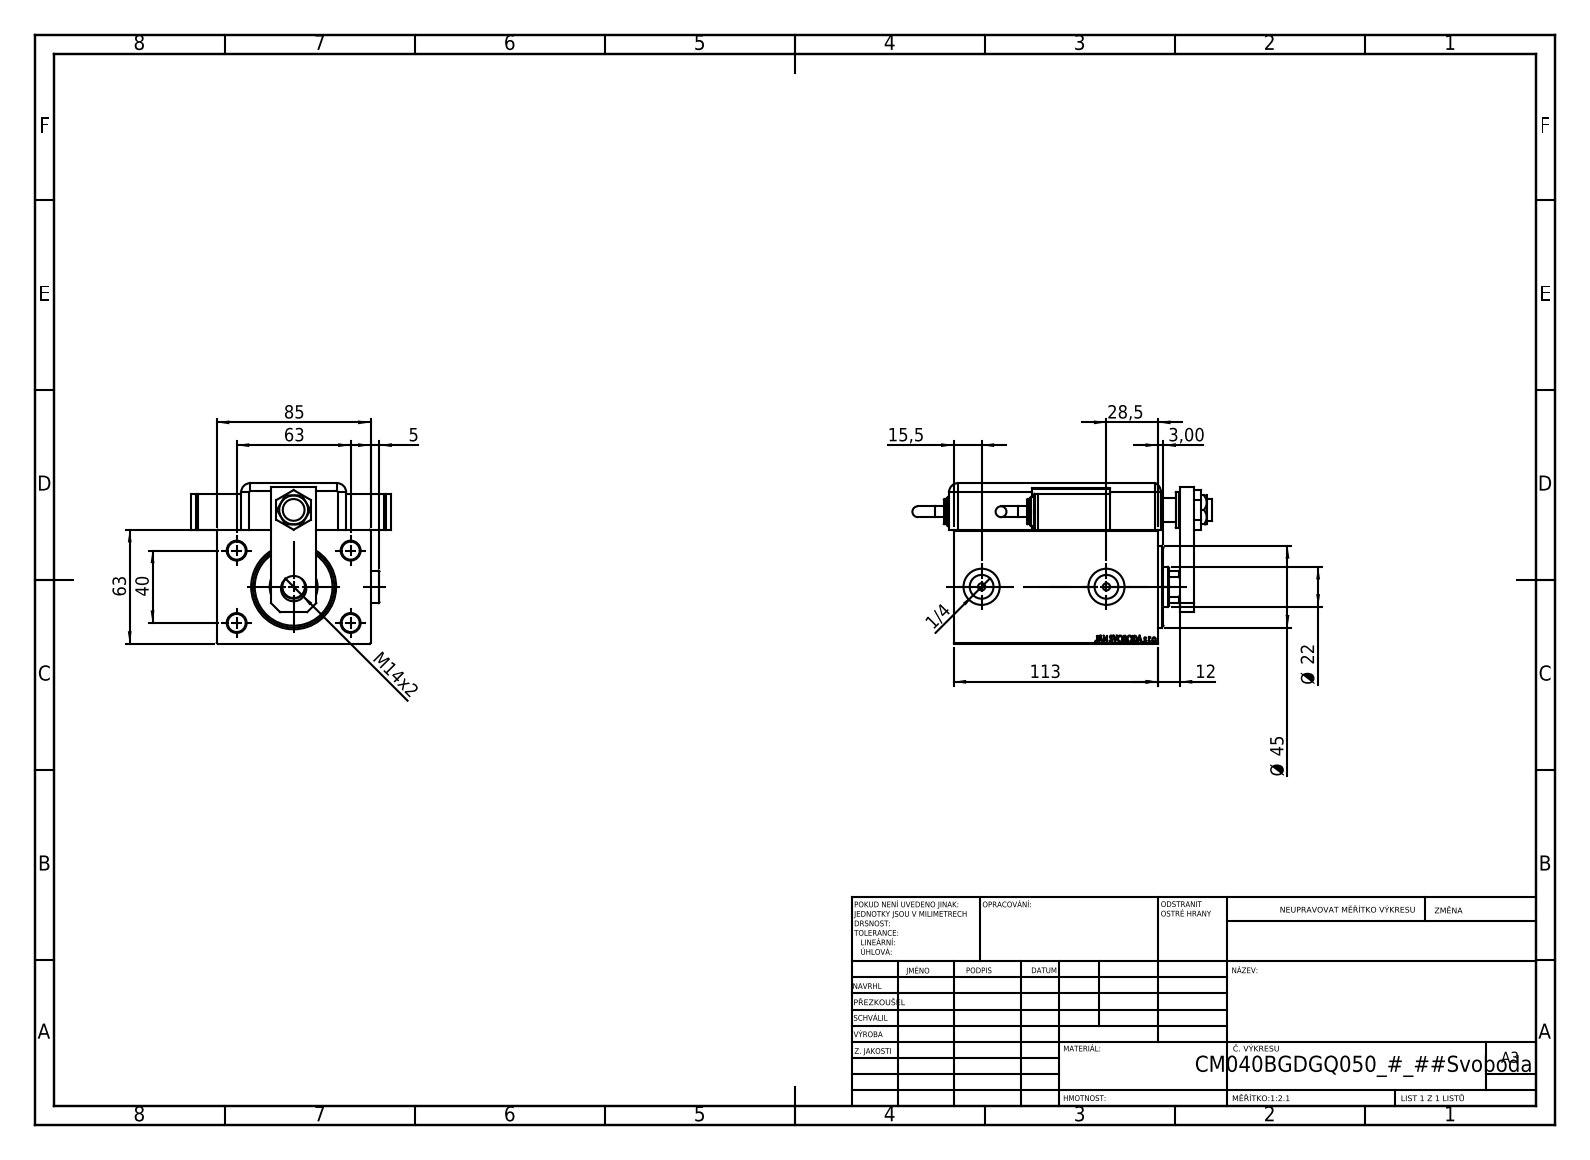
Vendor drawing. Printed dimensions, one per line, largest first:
113
85
63
63
Ø 45
40
28,5
Ø 22
15,5
M14x2
12
5
3,00
1/4
